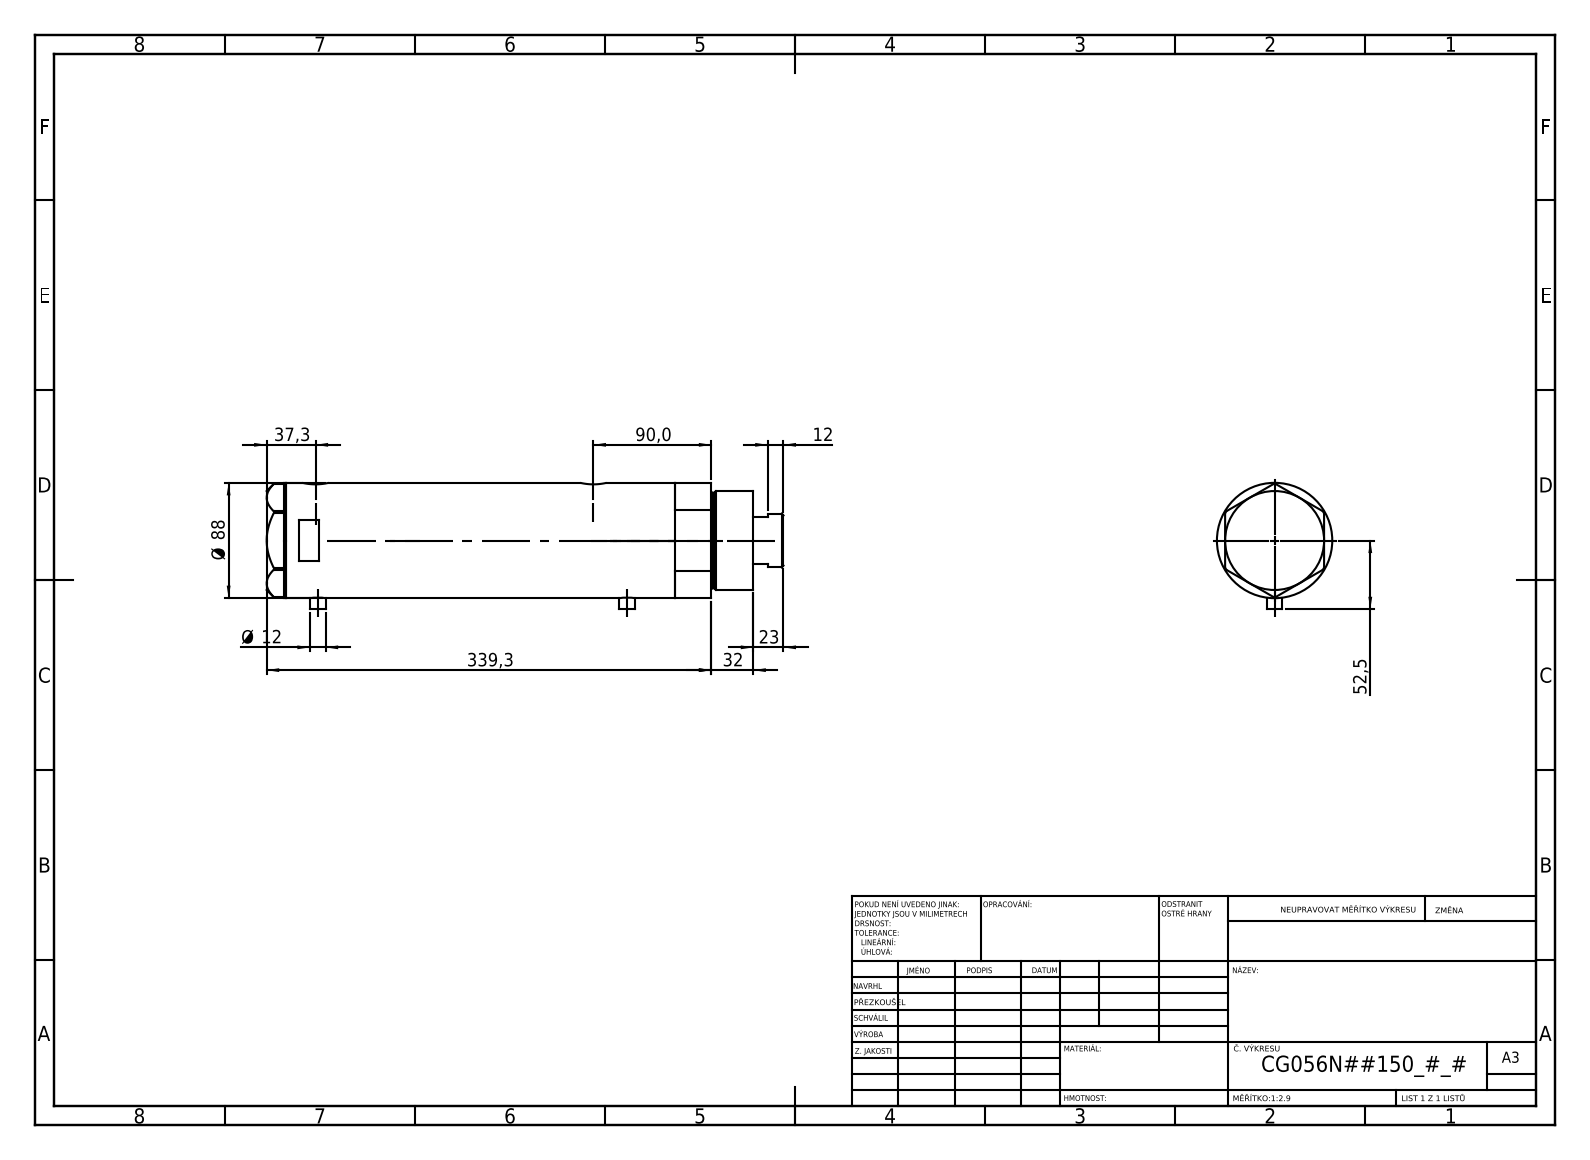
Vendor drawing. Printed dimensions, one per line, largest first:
339,3
90,0
Ø 88
52,5
37,3
32
23
12
Ø 12
